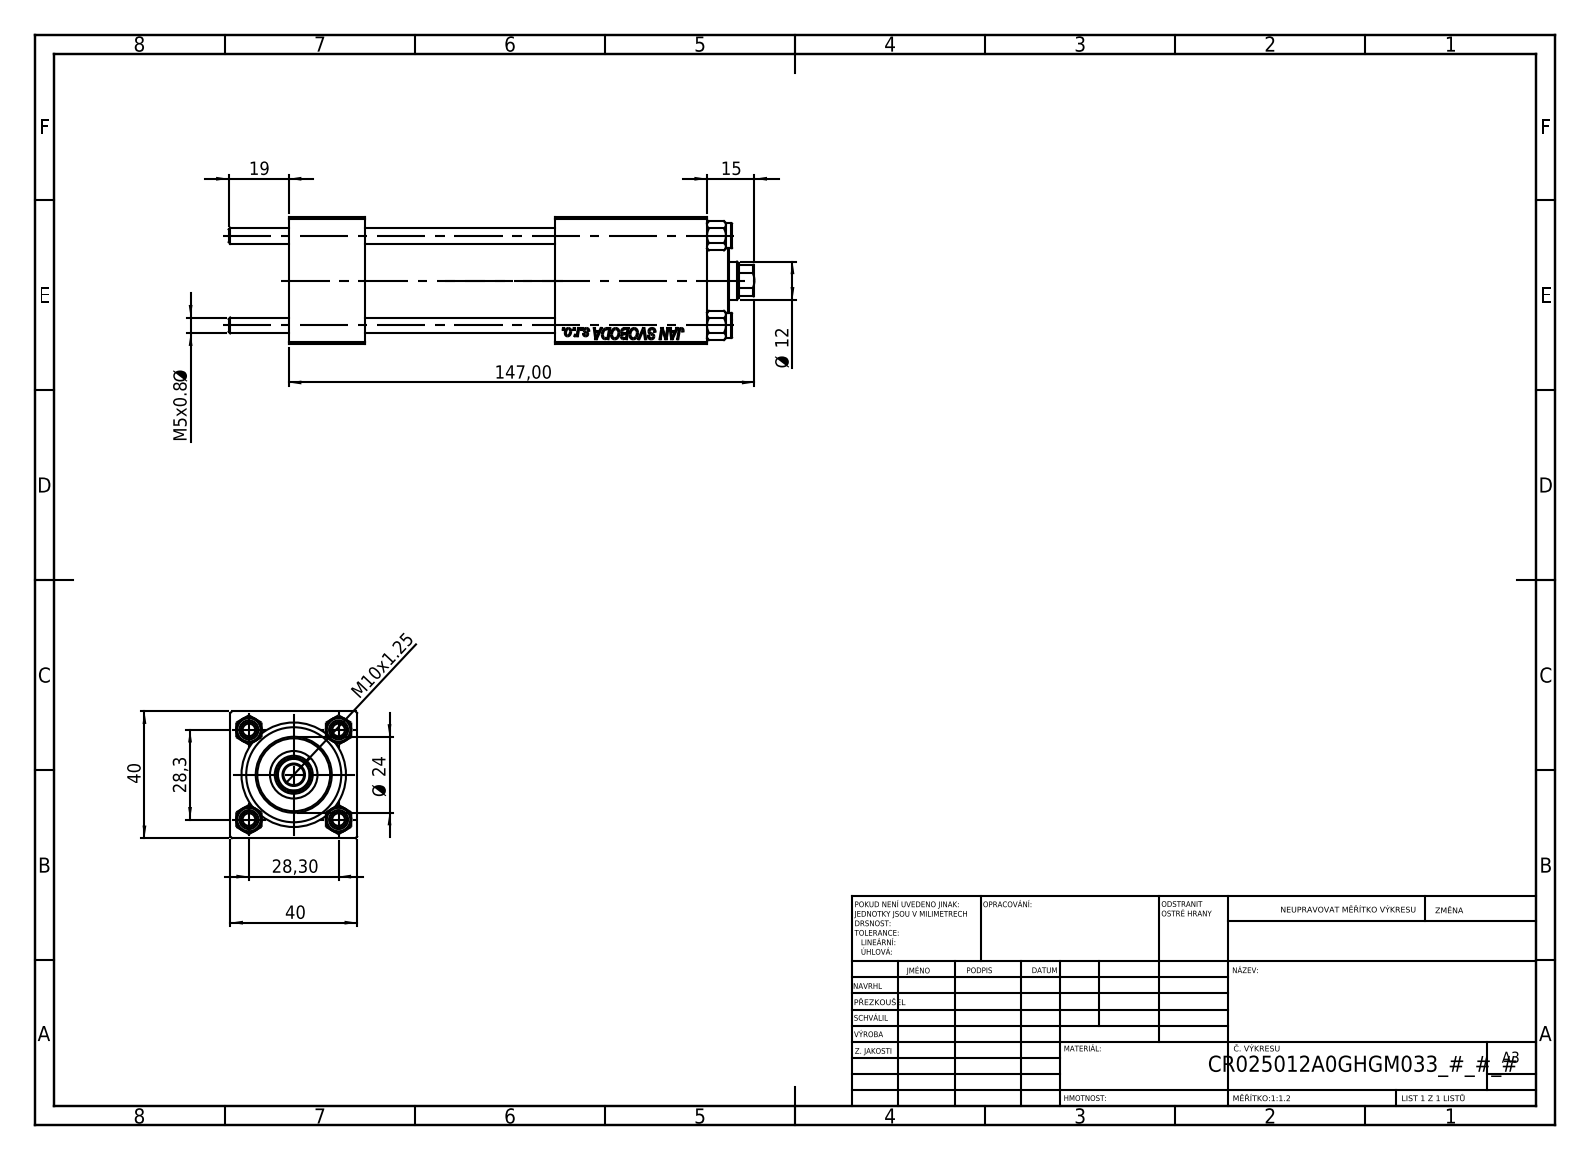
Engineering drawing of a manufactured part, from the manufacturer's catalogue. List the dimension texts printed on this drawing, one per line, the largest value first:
147,00
40
40
28,3
28,30
Ø 24
19
15
Ø 12
M10x1.25
M5x0.8 Ø
